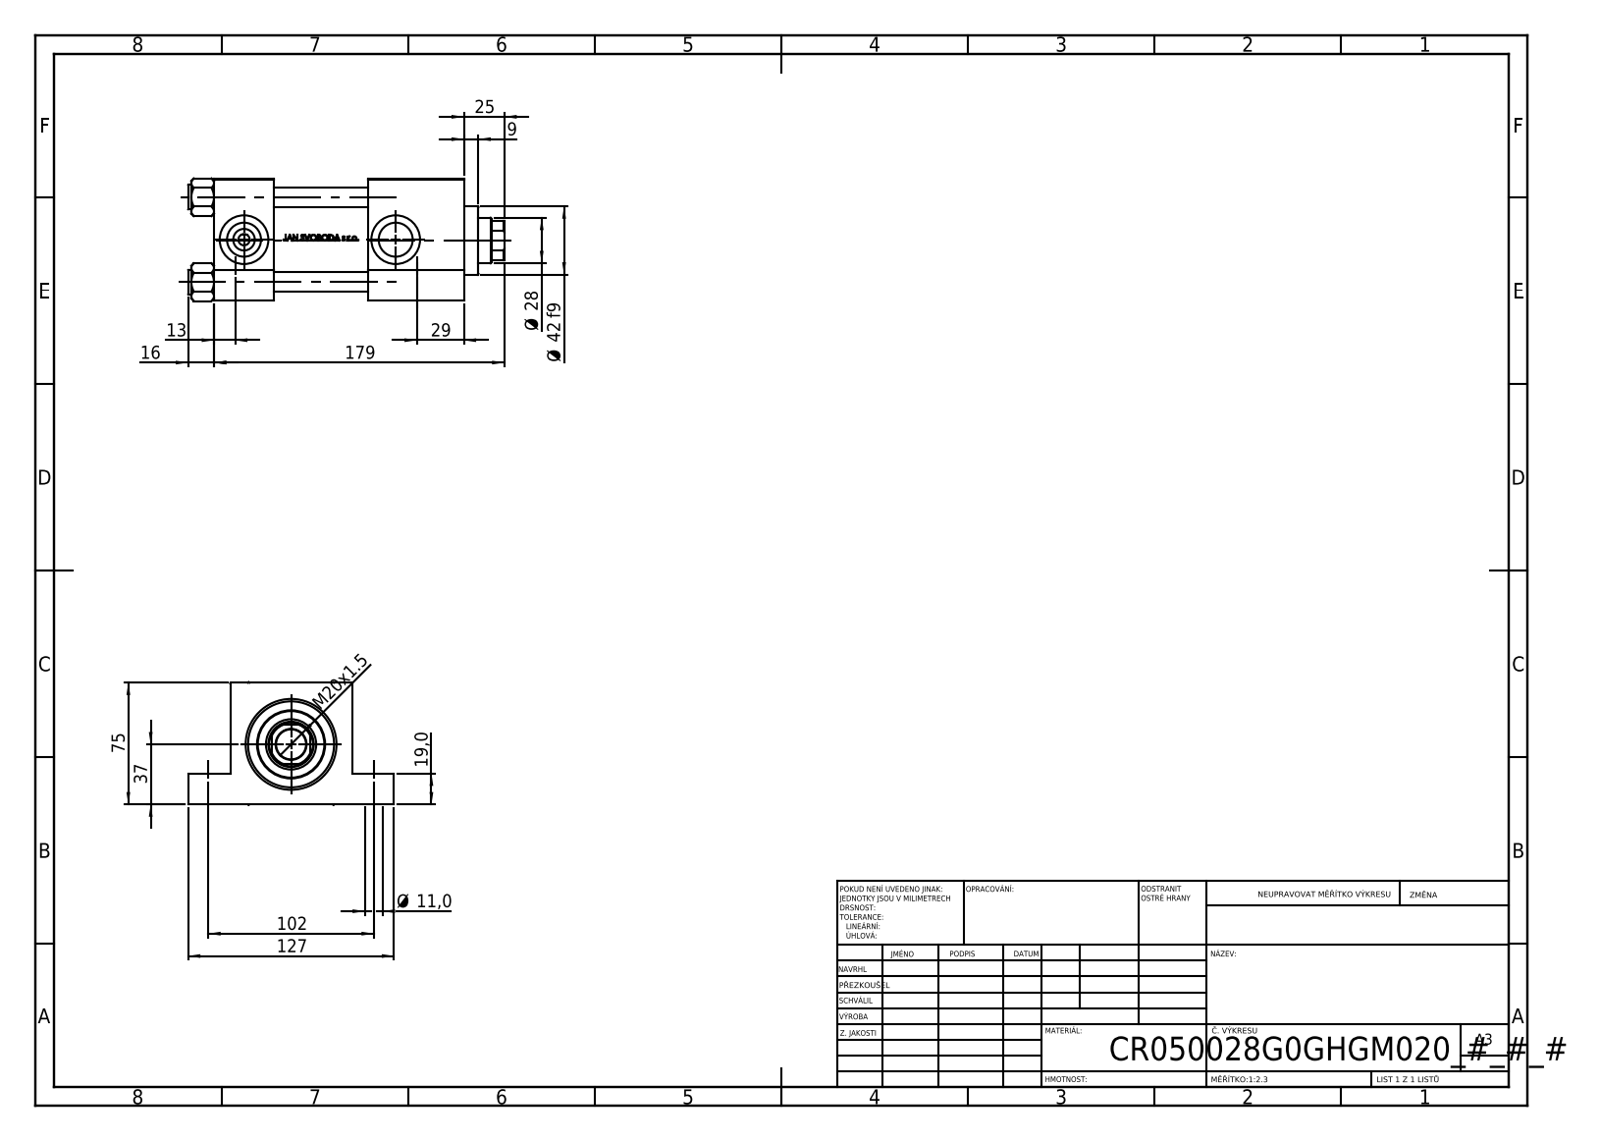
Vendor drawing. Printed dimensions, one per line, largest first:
179
127
102
75
Ø 42 f9
37
29
Ø 28
25
M20x1.5
19,0
16
13
Ø 11,0
9
